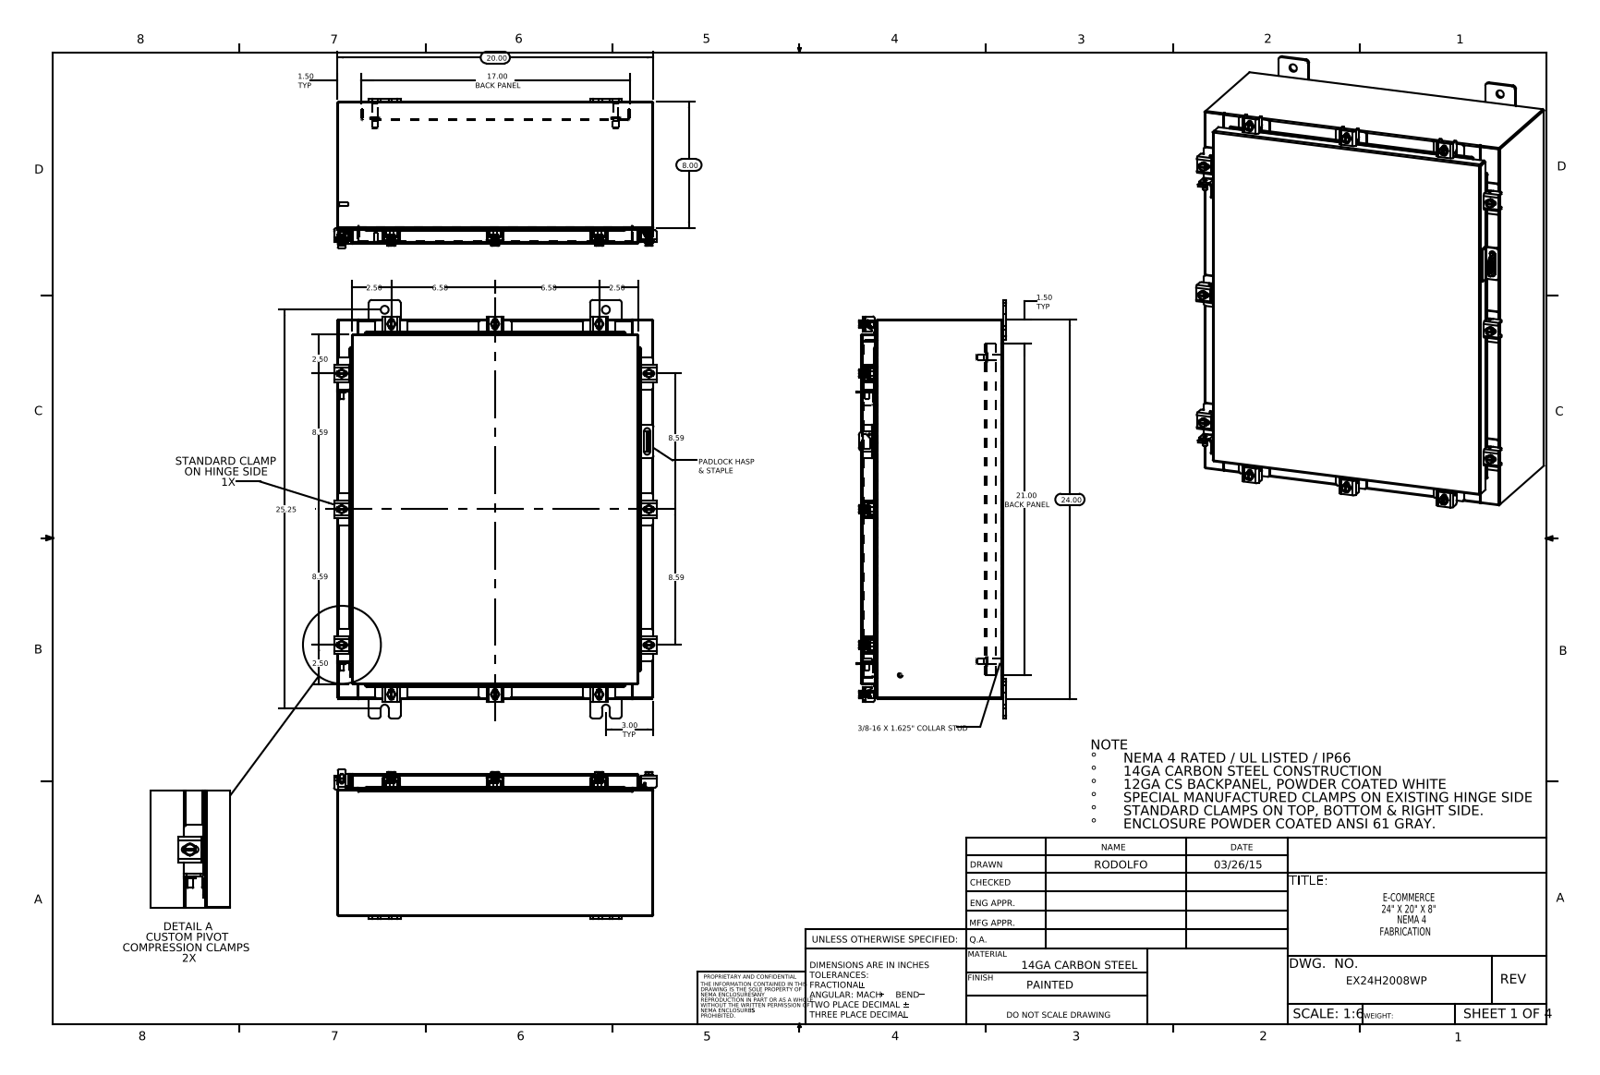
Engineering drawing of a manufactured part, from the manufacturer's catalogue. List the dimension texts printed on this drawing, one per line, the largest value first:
25.25
24.00
21.00 BACK PANEL
20.00
17.00 BACK PANEL
8.59
8.59
8.59
8.59
8.00
6.58
6.58
3.00 TYP
2.50
2.50
2.50
2.50
1.50 TYP
1.50 TYP
